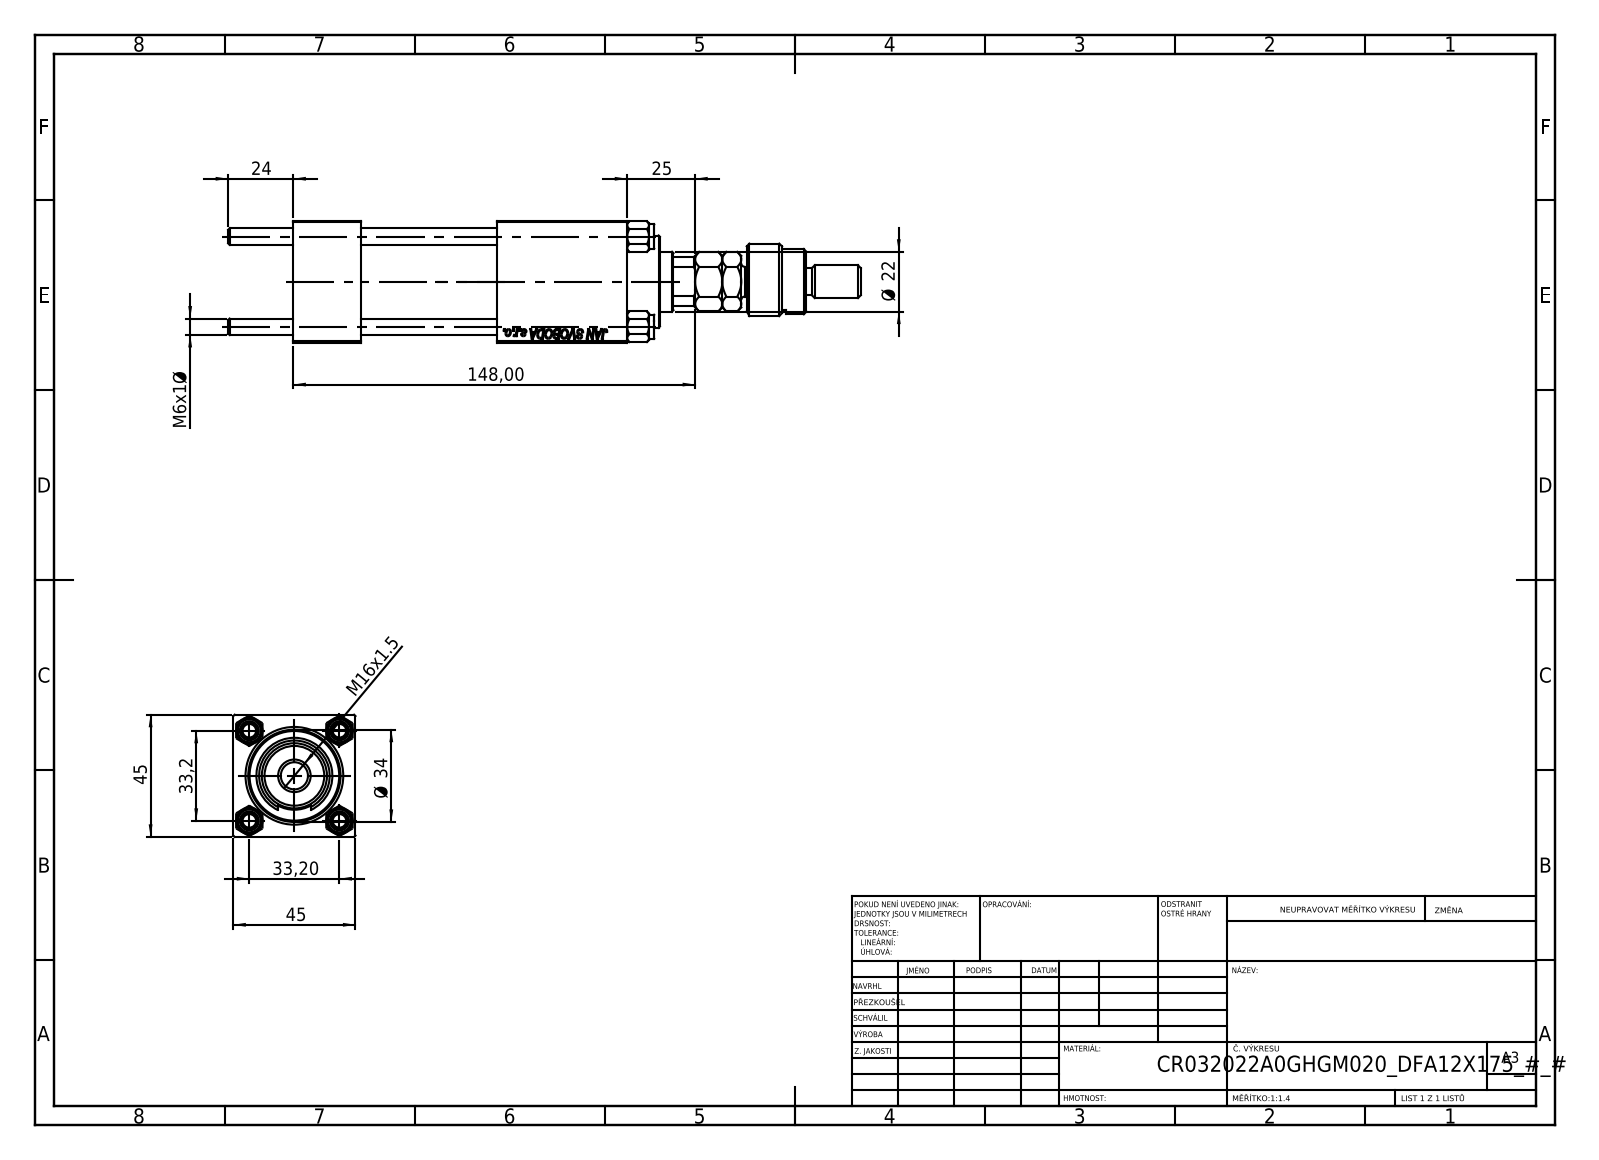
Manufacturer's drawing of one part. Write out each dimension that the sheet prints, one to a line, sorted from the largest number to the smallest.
148,00
45
45
Ø 34
33,2
33,20
25
24
Ø 22
M16x1.5
M6x1 Ø
